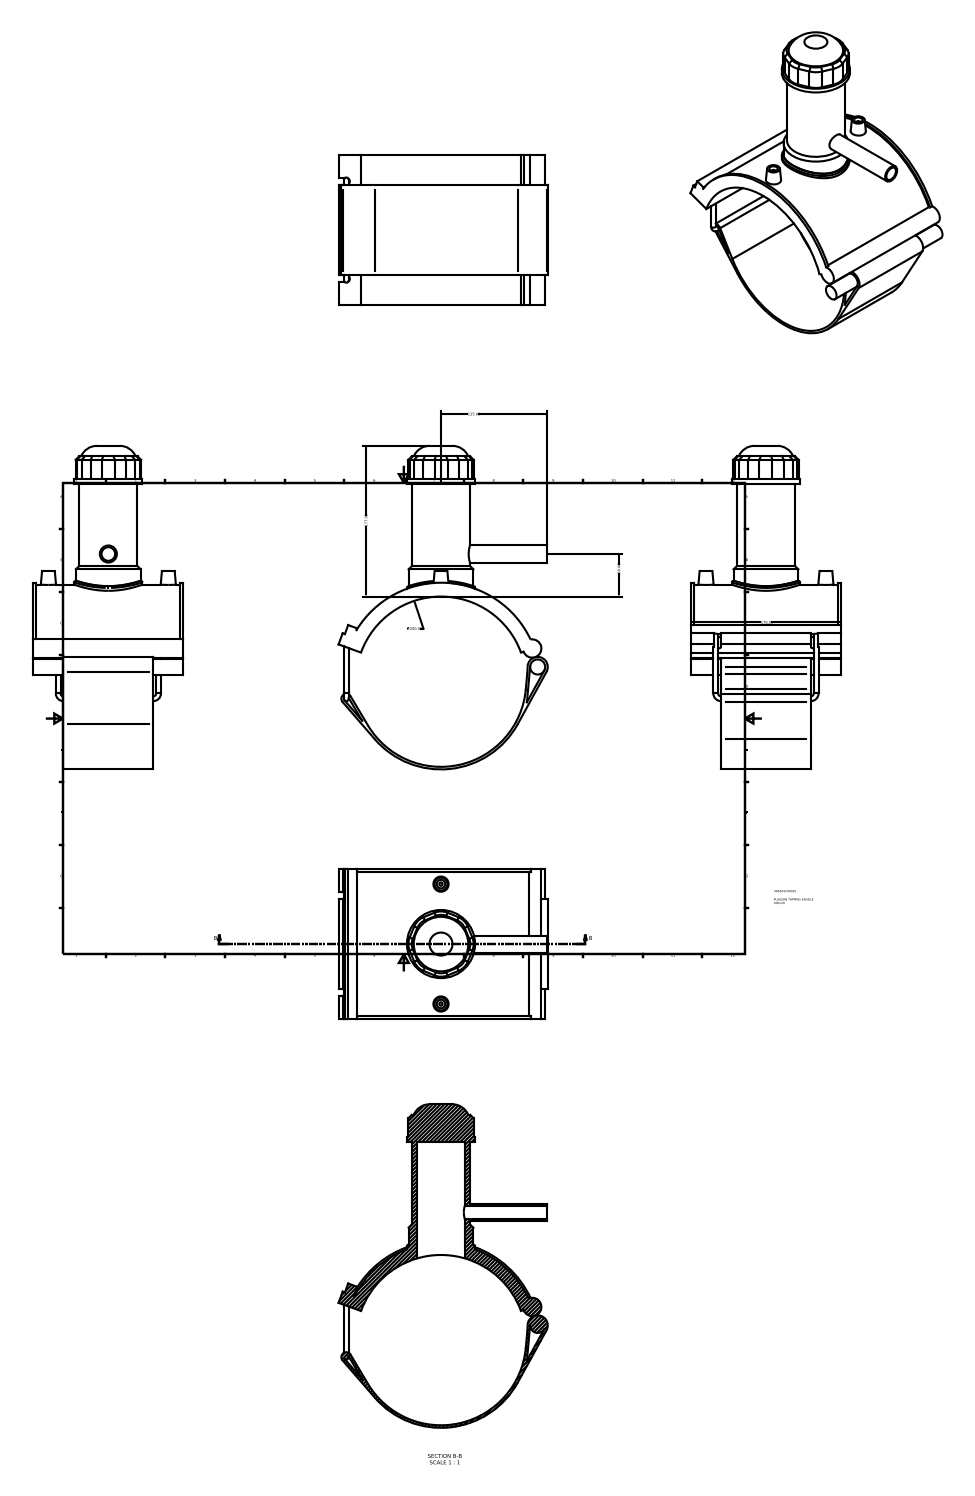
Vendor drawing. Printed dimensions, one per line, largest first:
∅200.00
177.00
176.00
125.00
50.00
